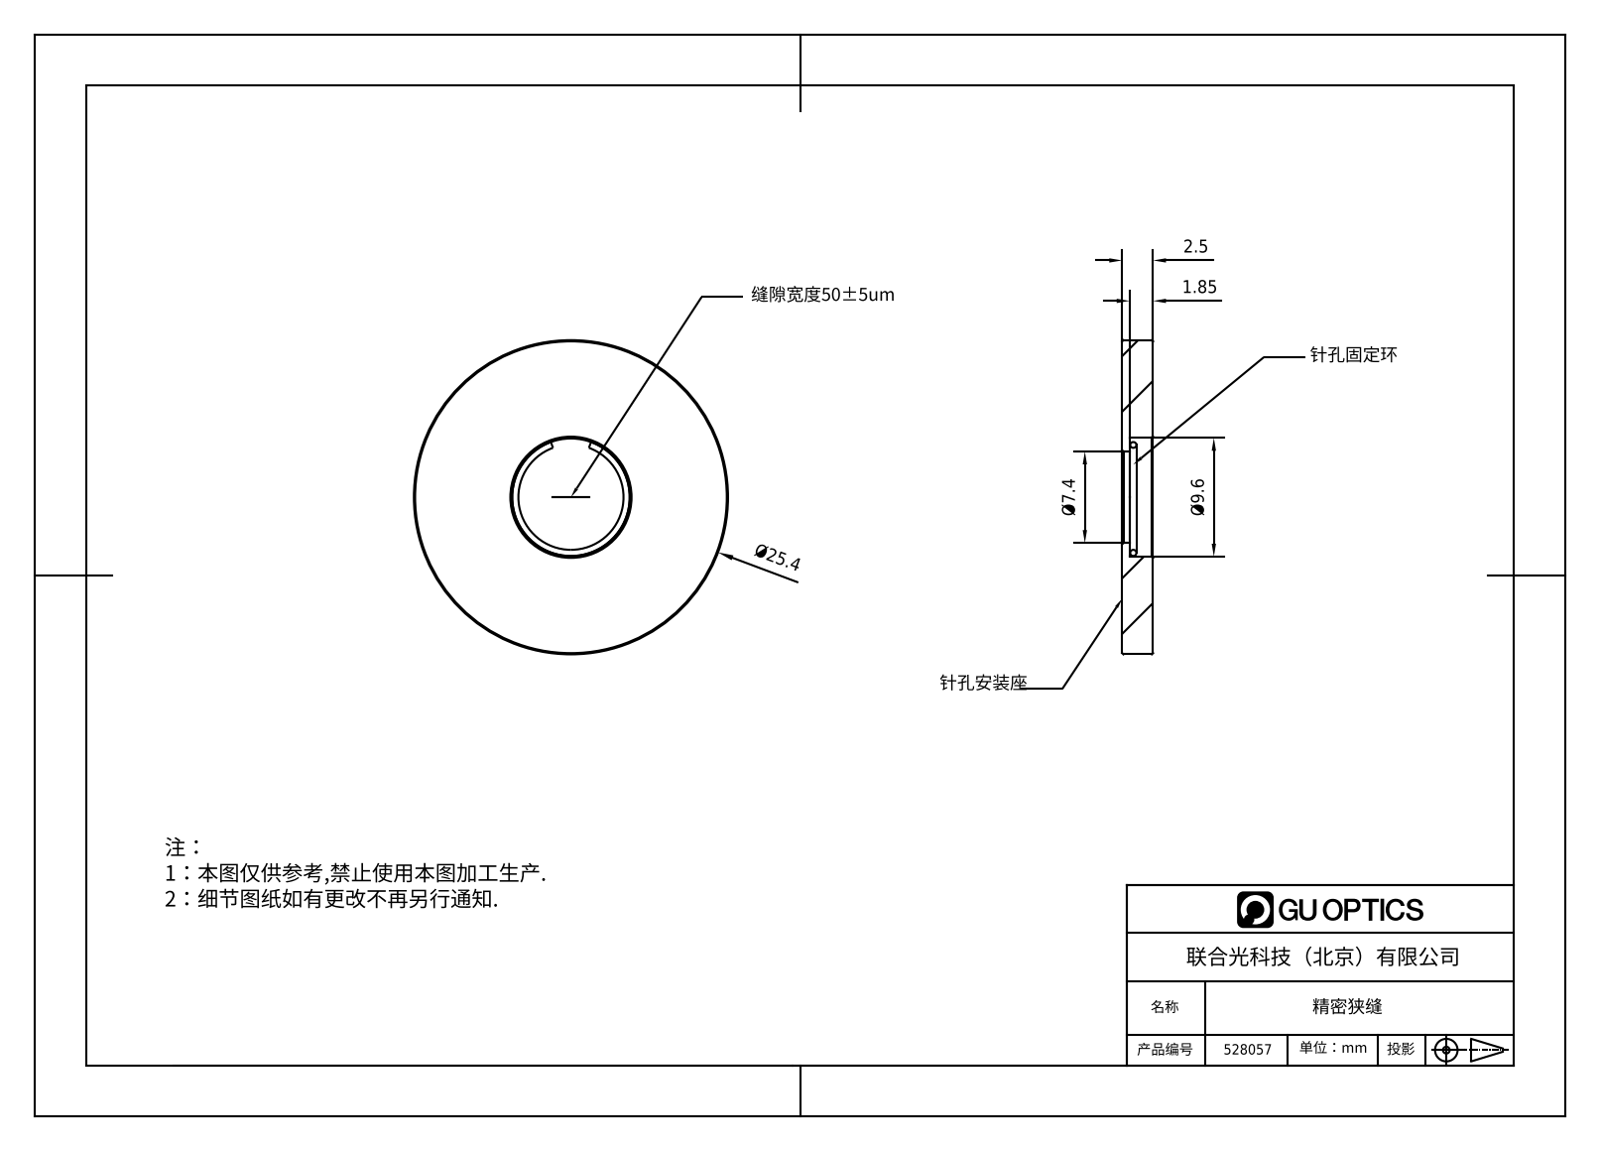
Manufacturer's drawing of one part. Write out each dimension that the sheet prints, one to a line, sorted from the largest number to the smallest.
Ø25.4
Ø9.6
Ø7.4
2.5
1.85
